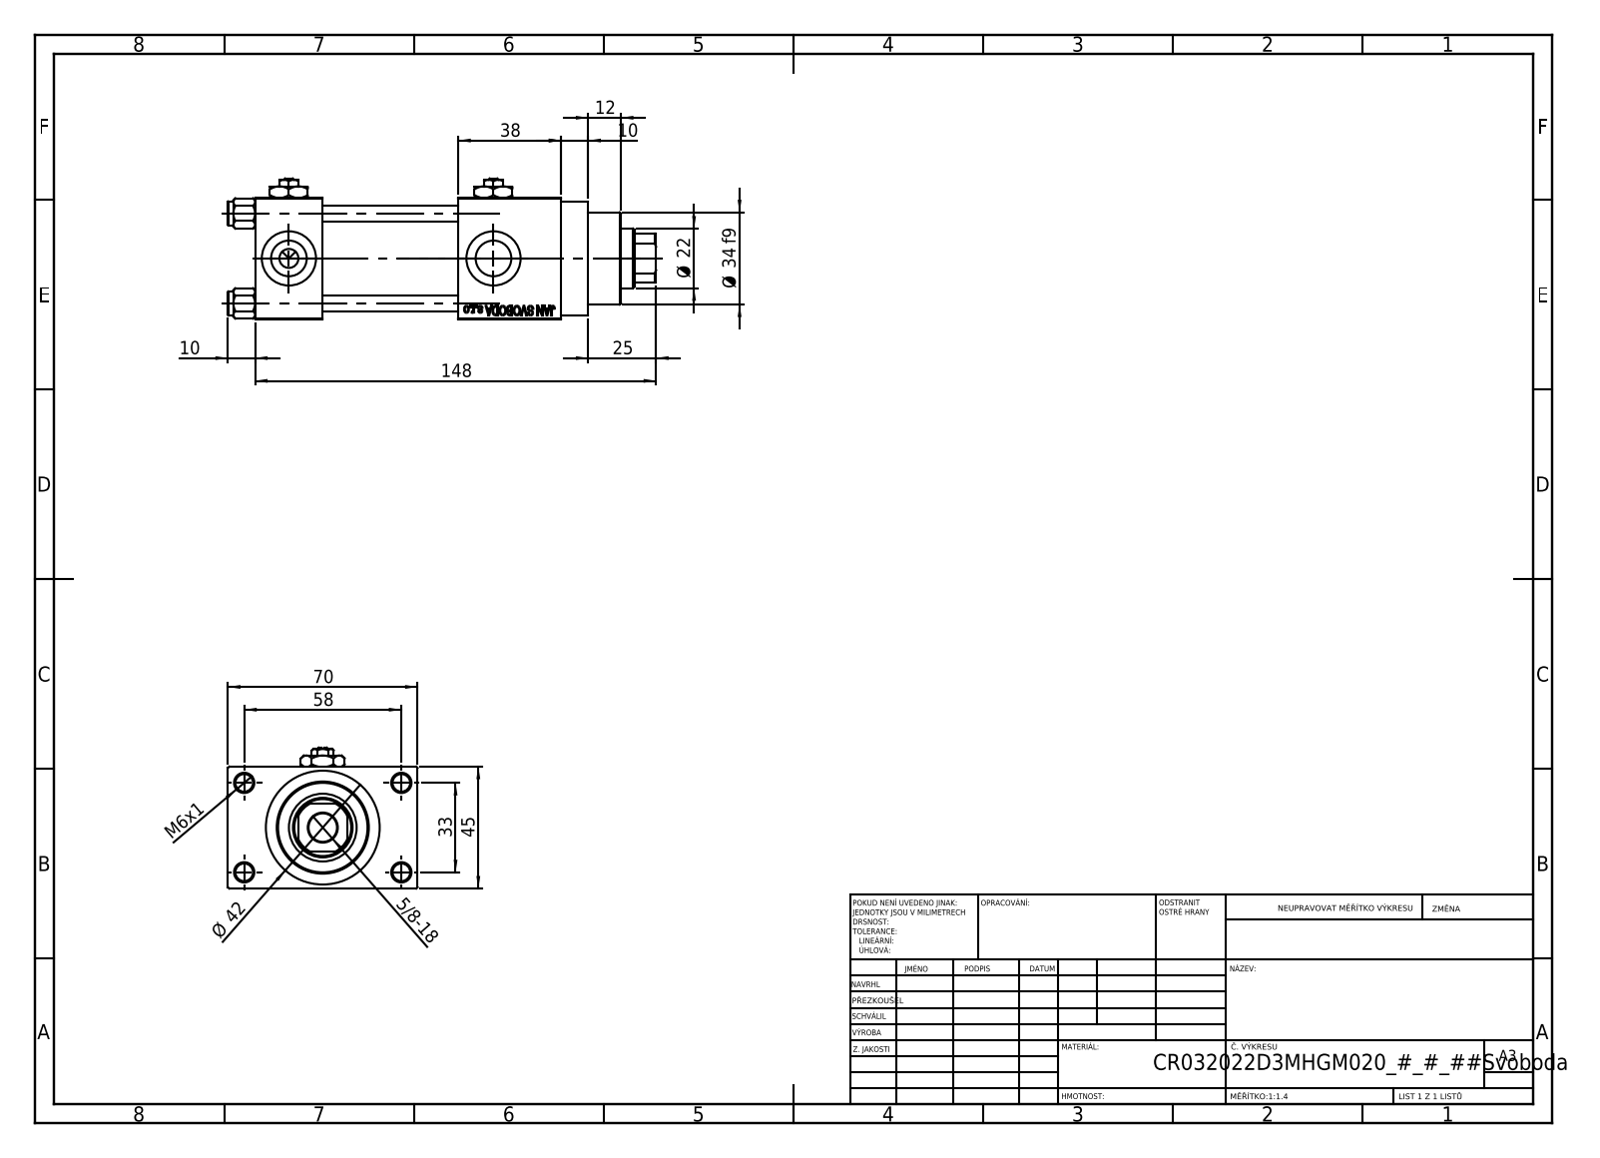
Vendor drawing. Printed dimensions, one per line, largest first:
148
70
58
45
Ø 42
38
Ø 34 f9
33
25
Ø 22
12
10
10
M6x1
5/8-18
